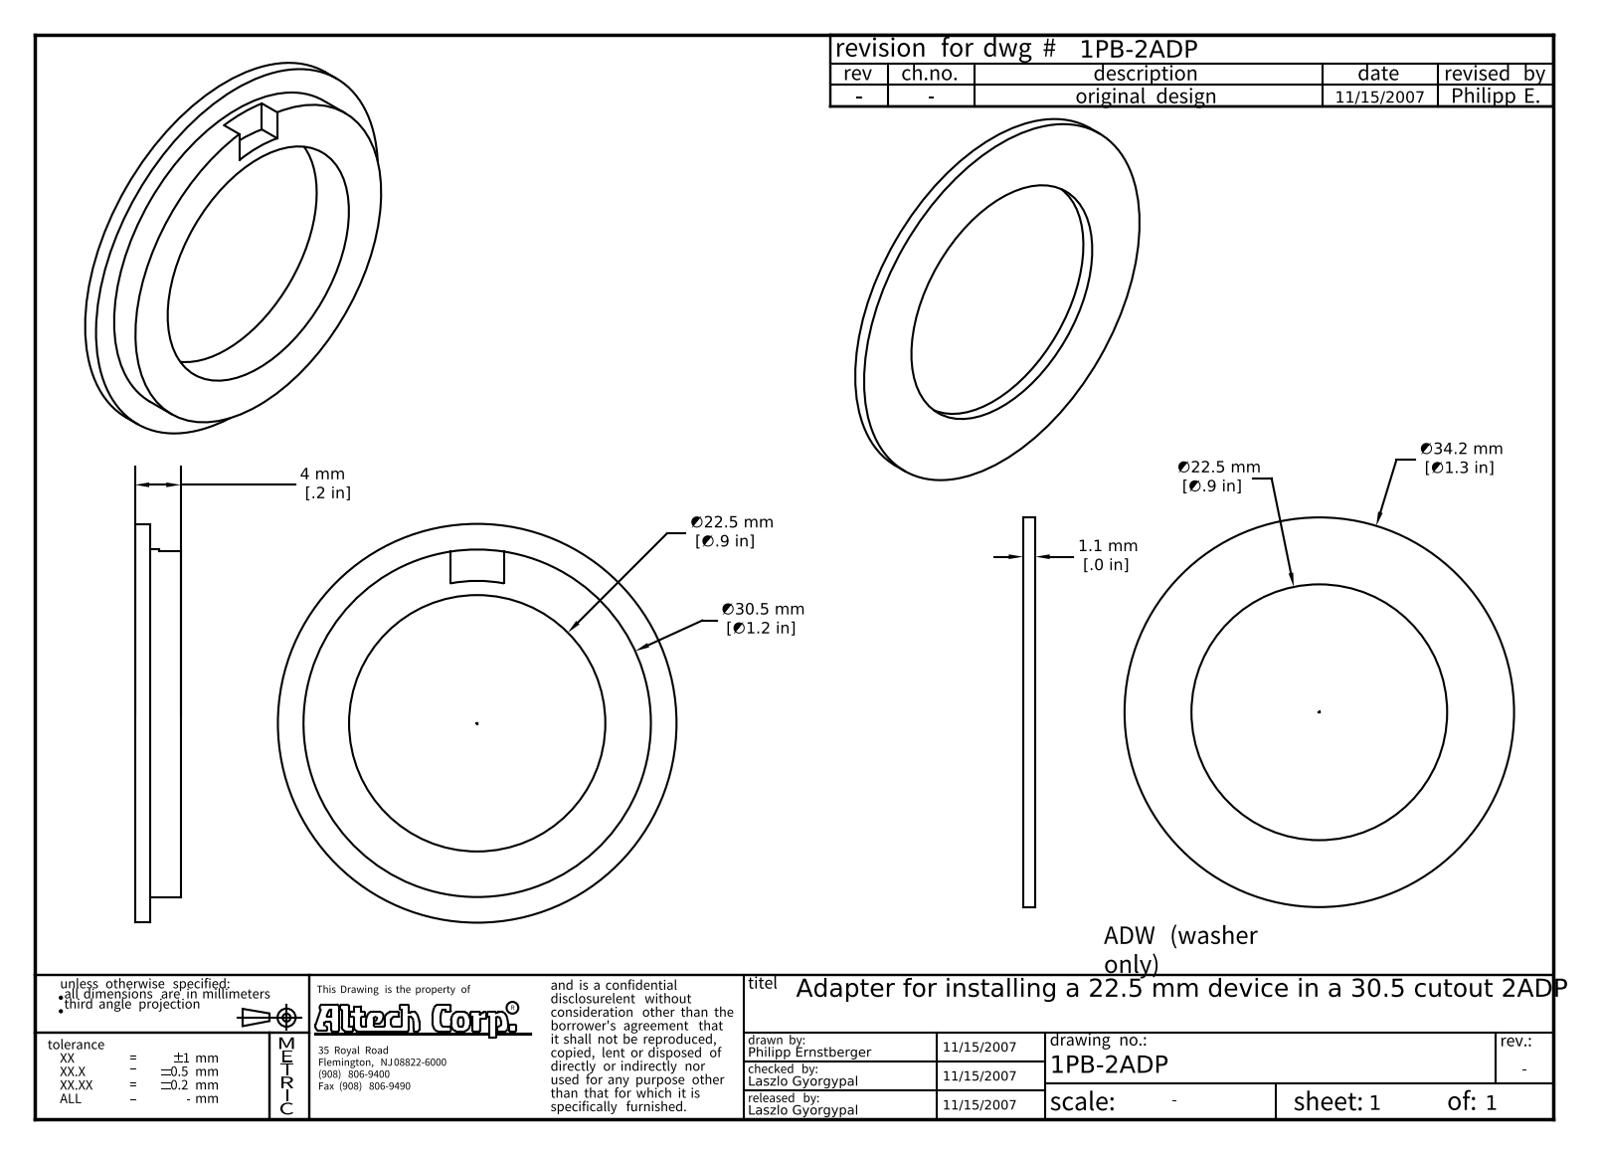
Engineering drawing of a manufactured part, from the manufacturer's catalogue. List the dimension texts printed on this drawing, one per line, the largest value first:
∅34.2 mm [∅1.3 in]
∅30.5 mm [∅1.2 in]
∅22.5 mm [∅.9 in]
∅22.5 mm [∅.9 in]
4 mm [.2 in]
1.1 mm [.0 in]
